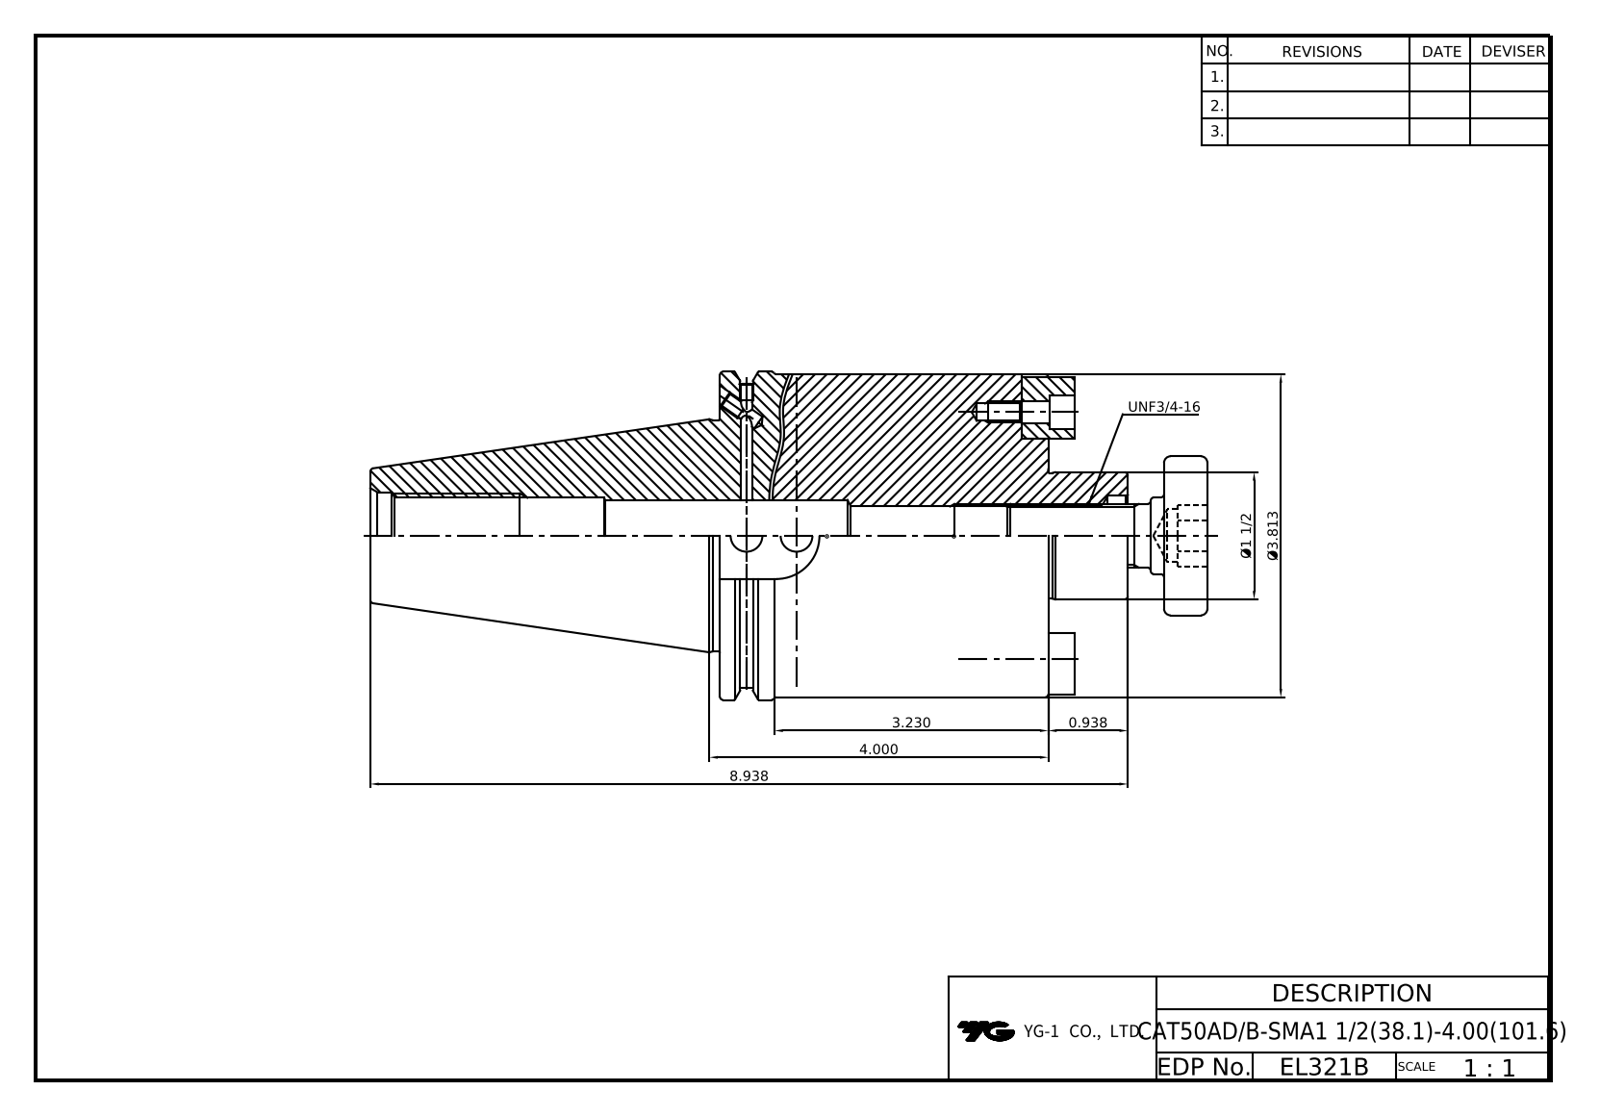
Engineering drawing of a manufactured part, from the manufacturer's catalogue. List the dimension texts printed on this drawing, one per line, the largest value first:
8.938
4.000
Ø3.813
3.230
Ø1 1/2
0.938
